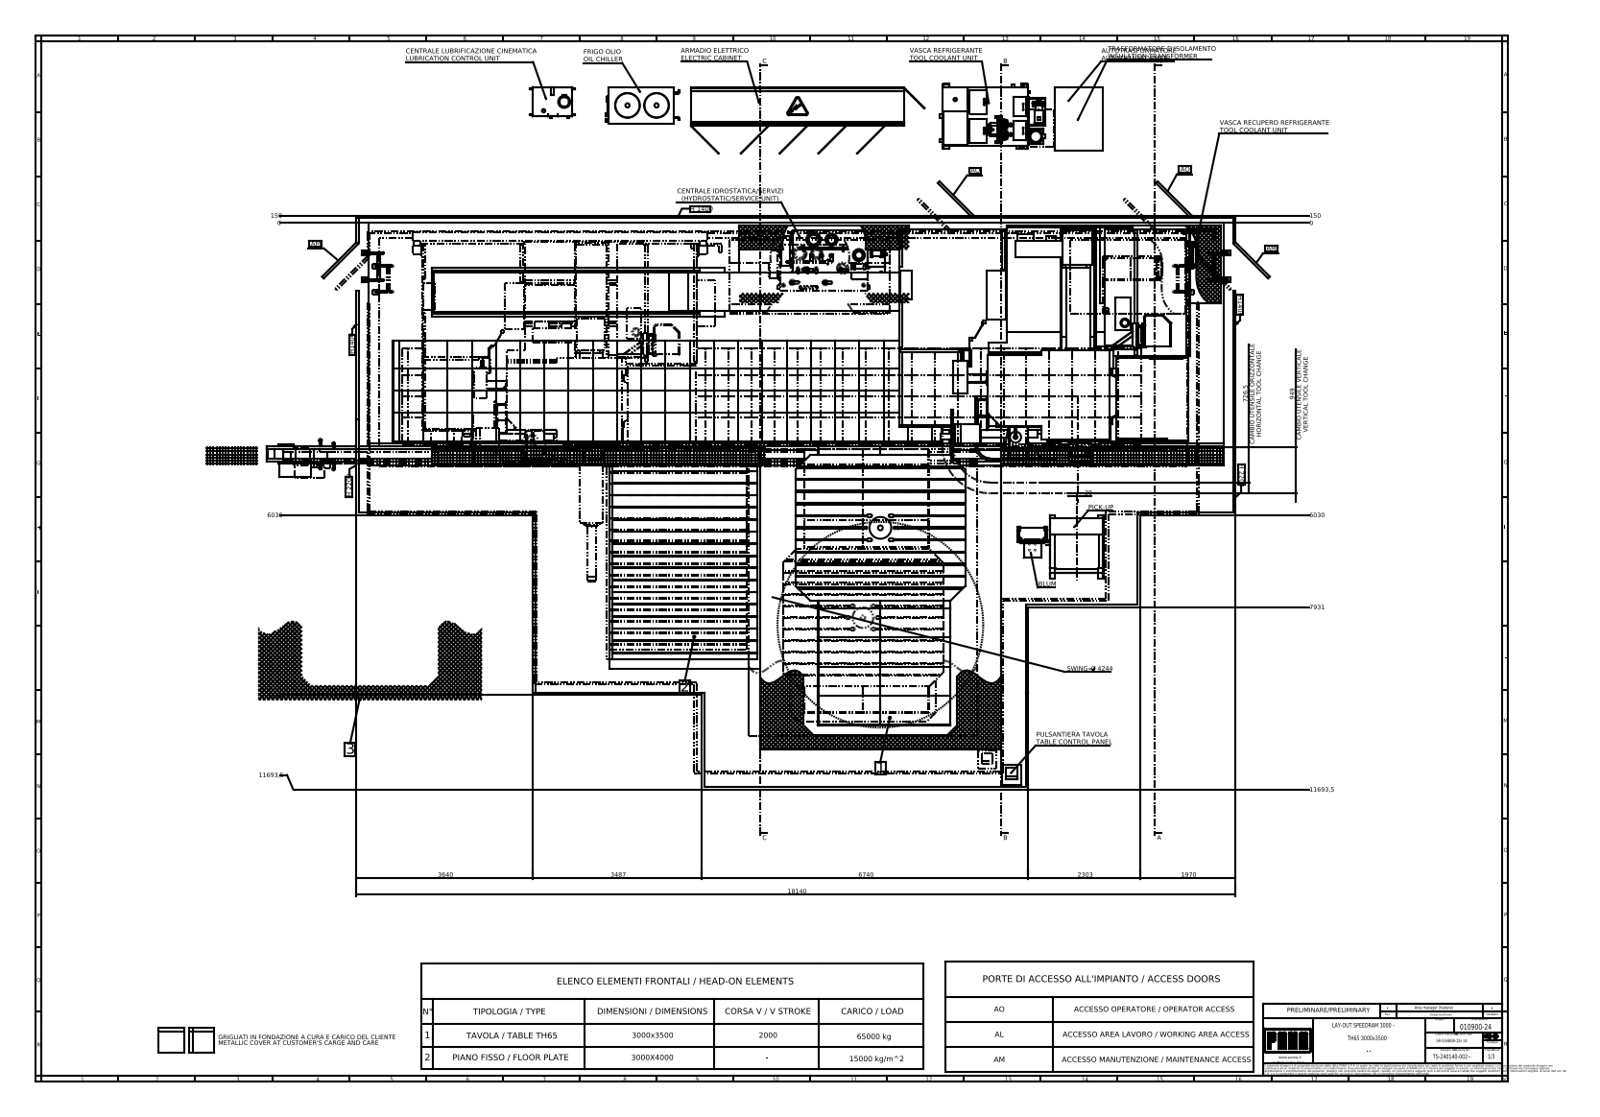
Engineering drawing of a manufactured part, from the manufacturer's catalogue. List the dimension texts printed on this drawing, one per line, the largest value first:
18140
11693,5
11693,5
9746
7931
6740
6030
6030
SWING= Ø 4244
3640
3487
2303
1970
949 CAMBIO UTENSILE VERTICALE VERTICAL TOOL CHANGE
726,5 CAMBIO UTENSILE ORIZZONTALE HORIZONTAL TOOL CHANGE
150
150
30
0
0
